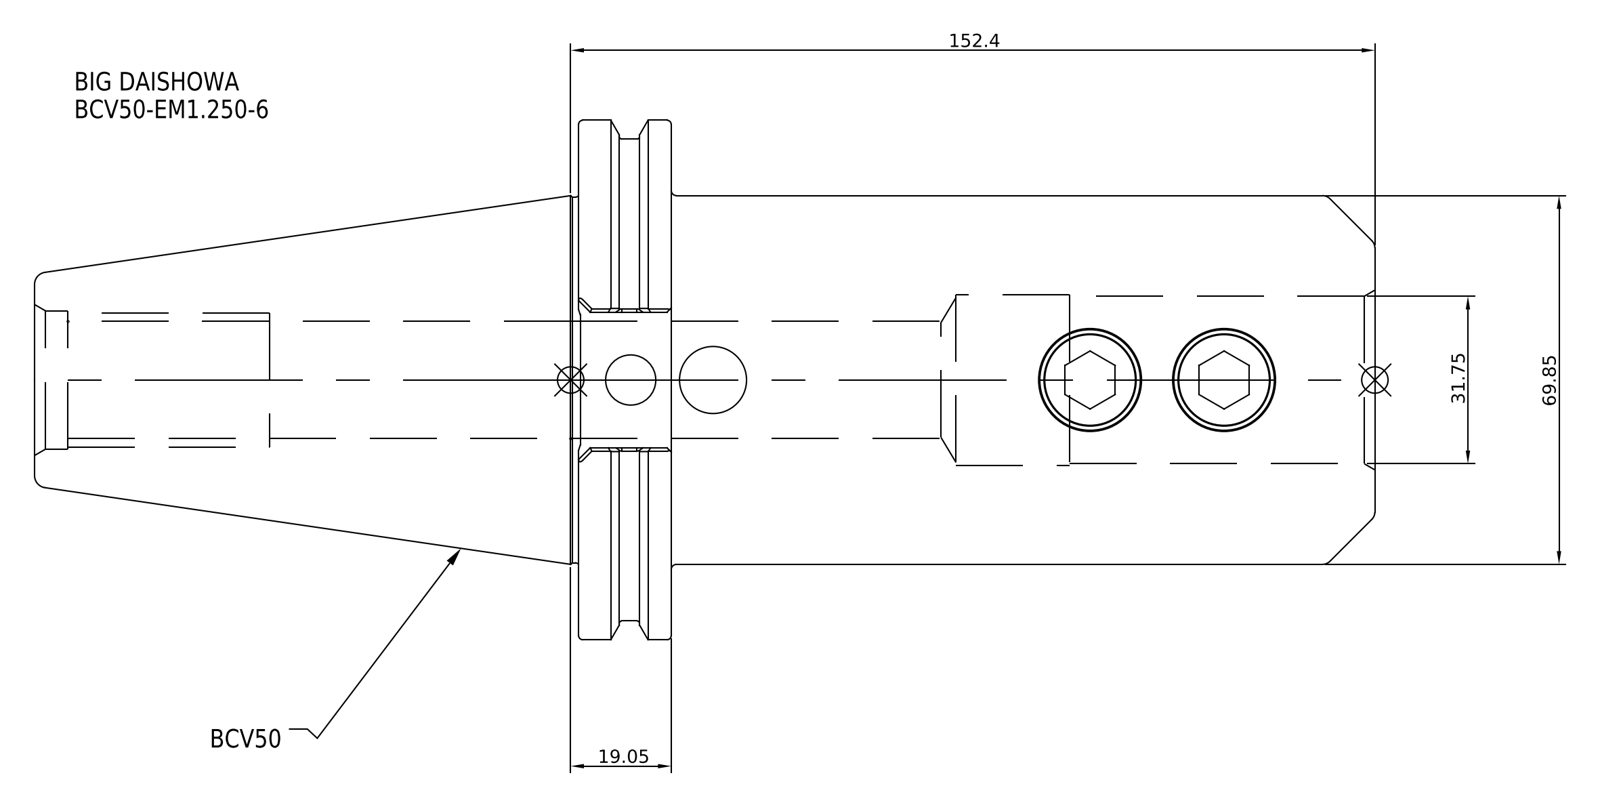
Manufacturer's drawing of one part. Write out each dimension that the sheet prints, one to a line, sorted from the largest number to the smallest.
152.4
69.85
31.75
19.05
